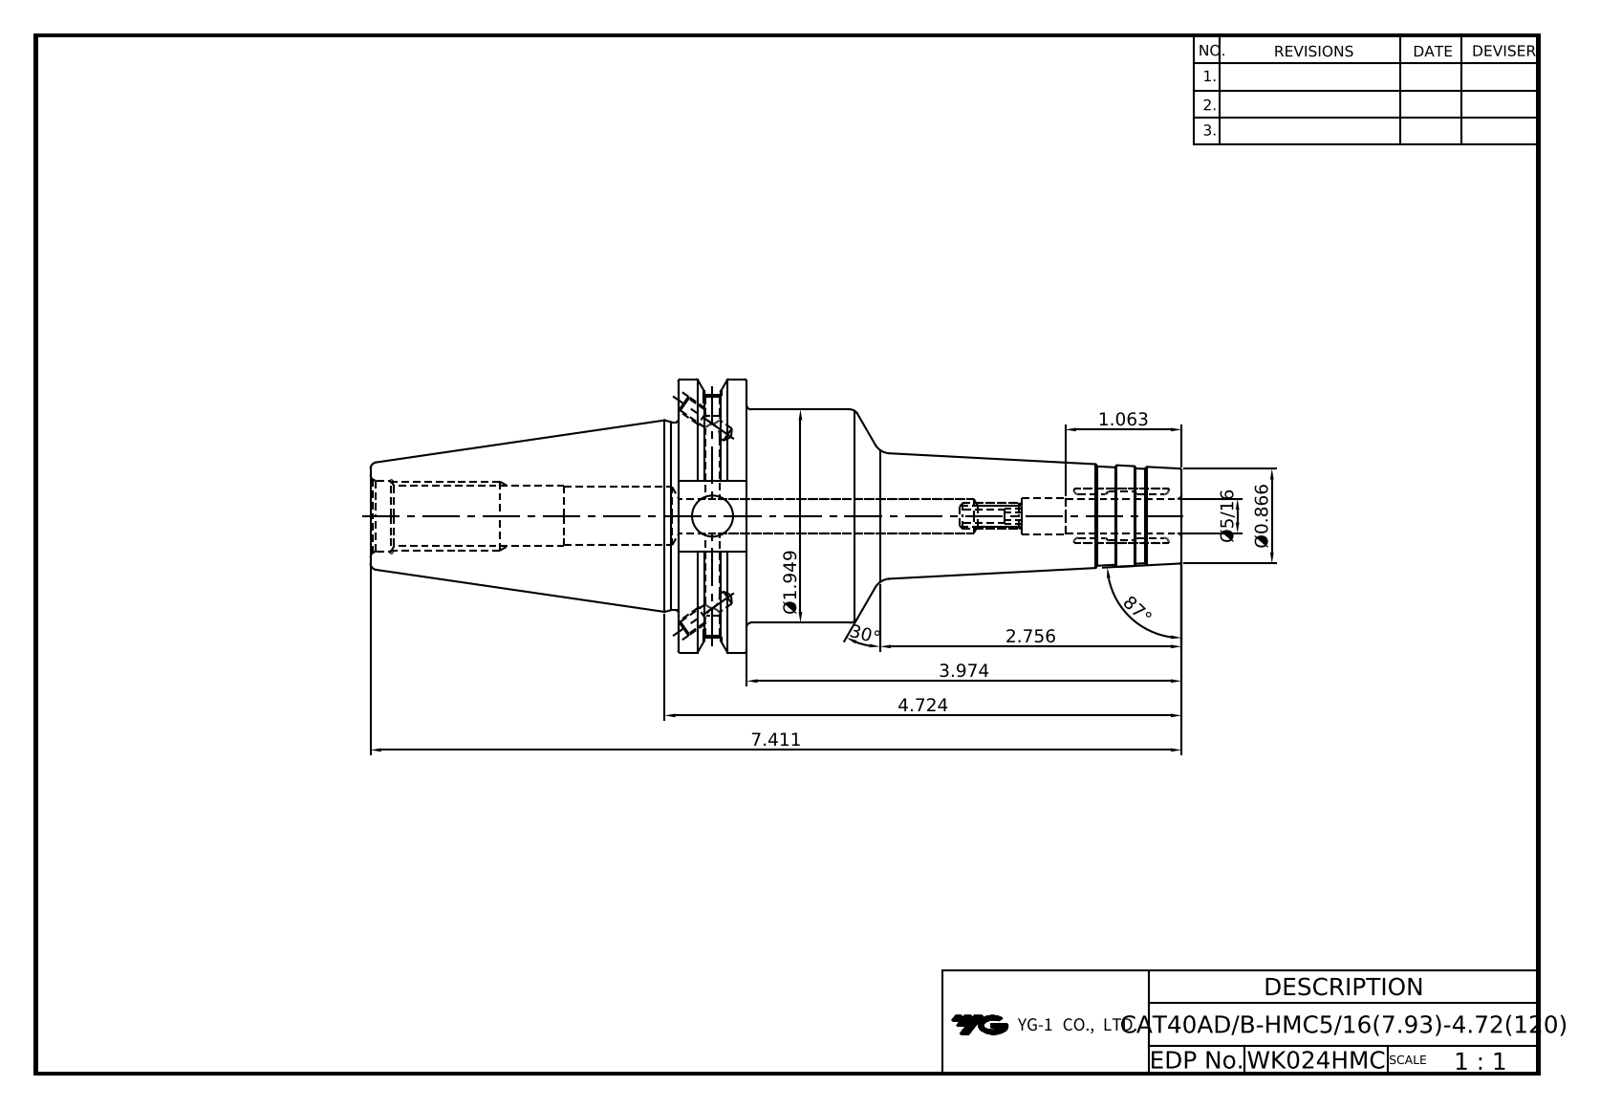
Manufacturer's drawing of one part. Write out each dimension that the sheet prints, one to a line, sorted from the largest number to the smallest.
87°
30°
7.411
4.724
3.974
2.756
Ø1.949
1.063
Ø0.866
Ø5/16
